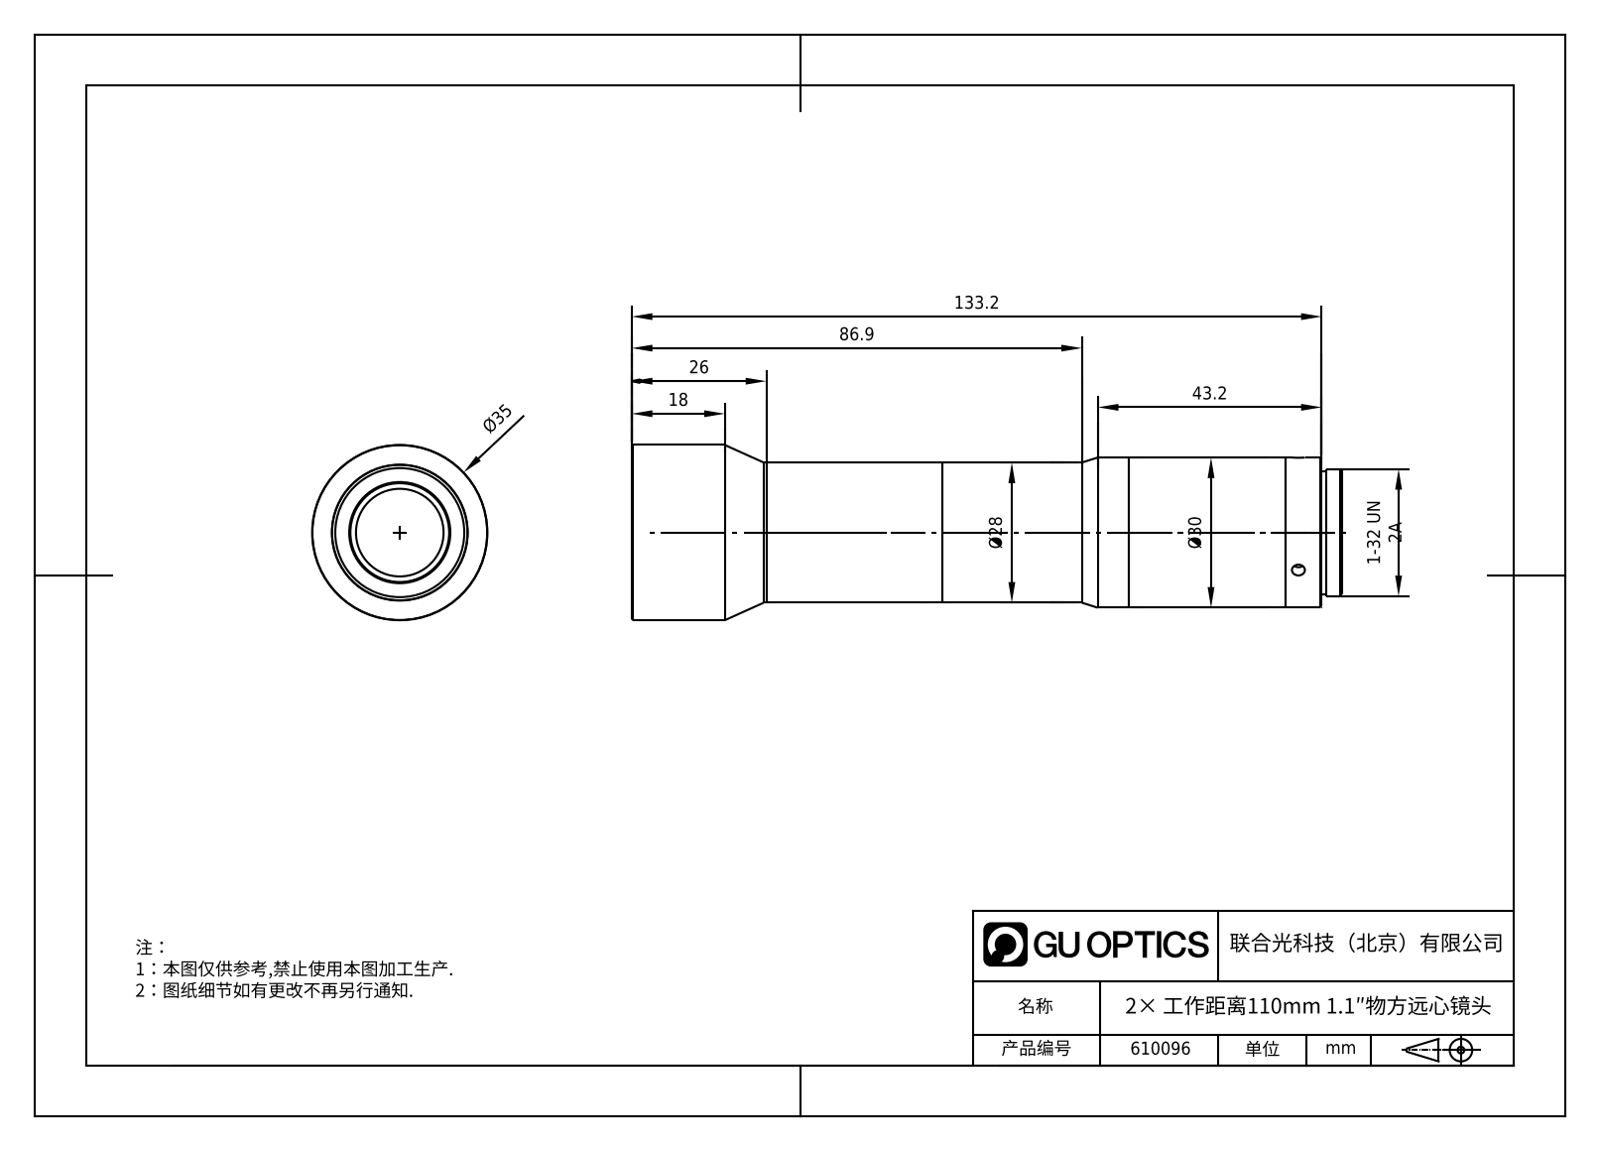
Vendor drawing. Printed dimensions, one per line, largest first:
133.2
86.9
43.2
Ø35
Ø30
Ø28
26
18
1-32 UN 2A
